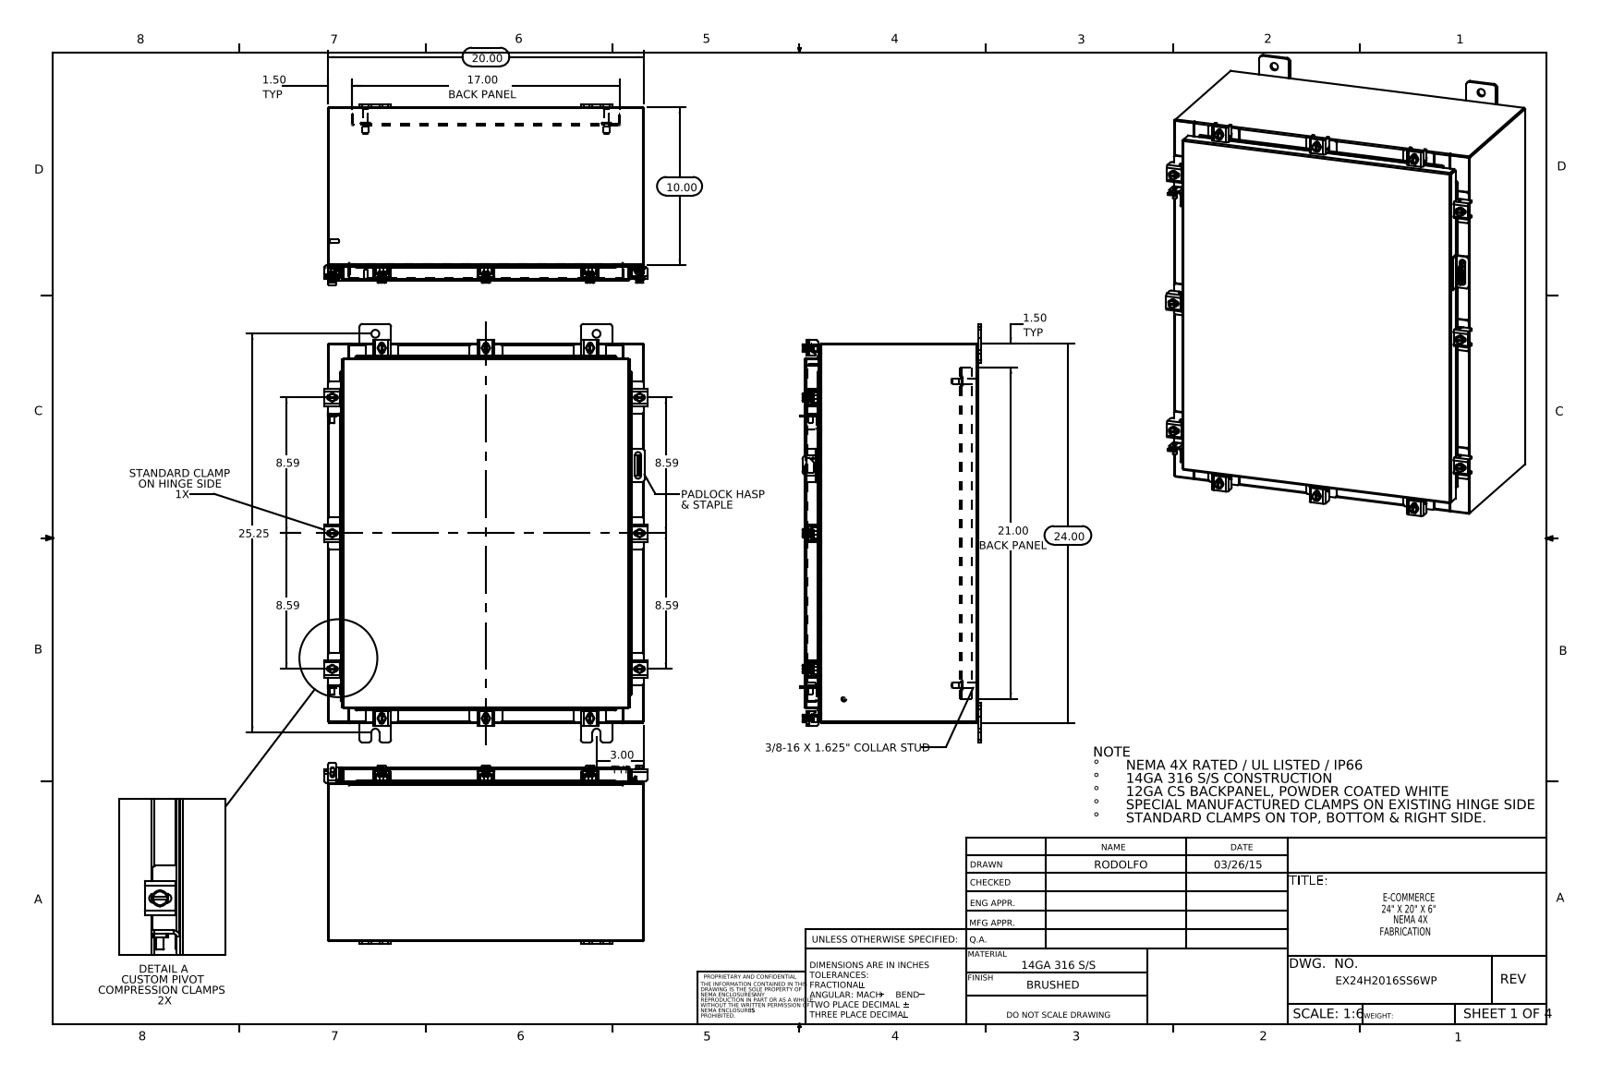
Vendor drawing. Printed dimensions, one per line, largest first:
25.25
24.00
21.00 BACK PANEL
20.00
17.00 BACK PANEL
10.00
8.59
8.59
8.59
8.59
3.00 TYP
1.50 TYP
1.50 TYP
